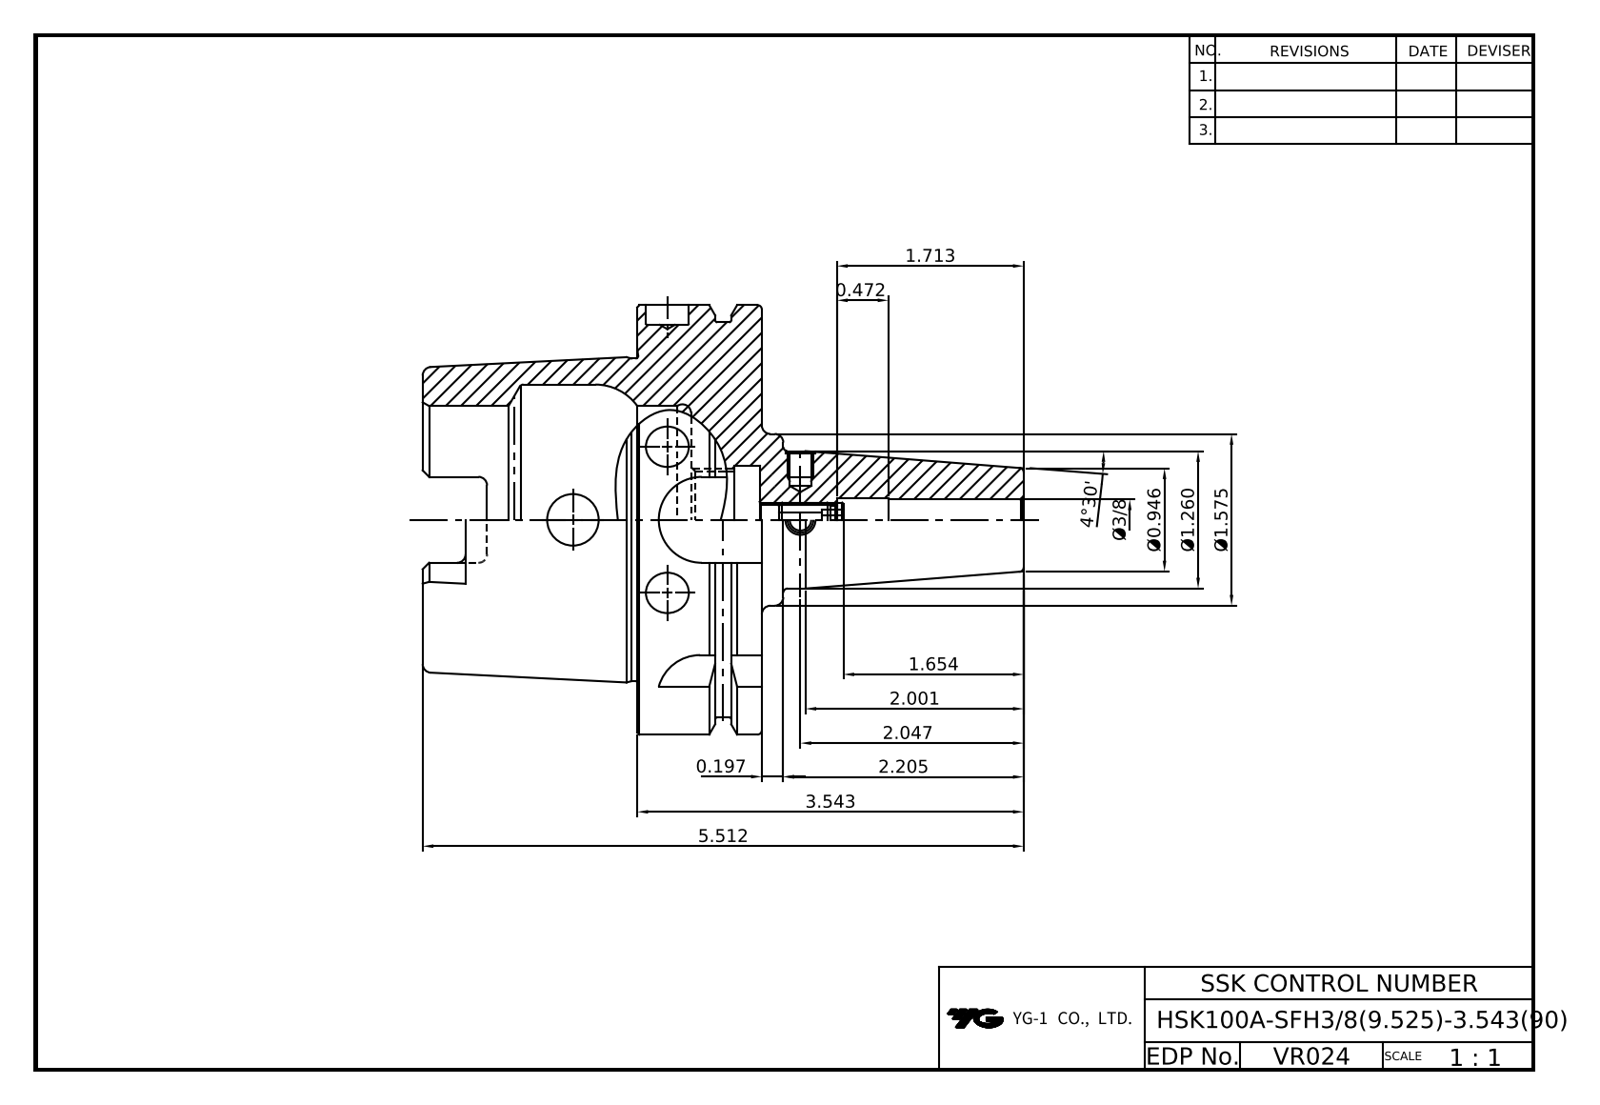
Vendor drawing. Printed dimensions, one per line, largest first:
5.512
4°30'
3.543
2.205
2.047
2.001
1.713
1.654
Ø1.575
Ø1.260
Ø0.946
0.472
0.197
